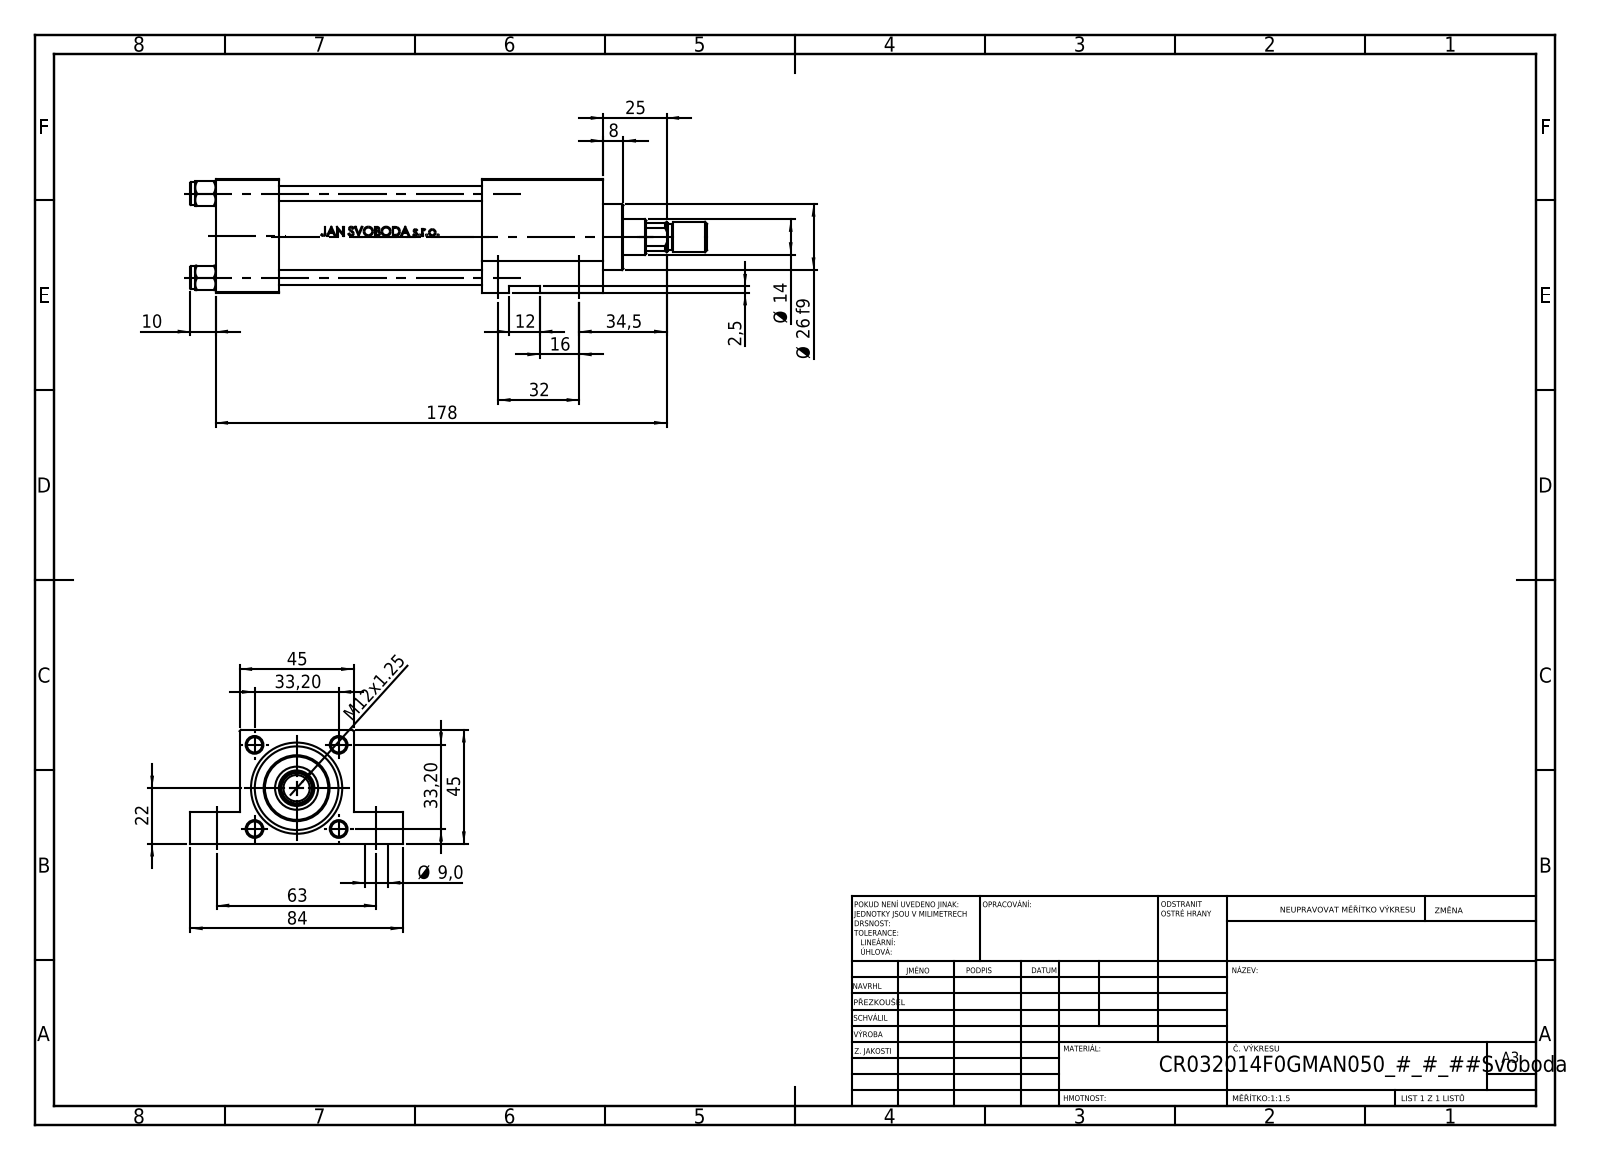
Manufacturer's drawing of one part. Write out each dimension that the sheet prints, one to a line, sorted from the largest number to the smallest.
178
84
63
45
45
34,5
33,20
33,20
32
Ø 26 f9
25
22
16
Ø 14
12
M12x1.25
10
Ø 9,0
8
2,5
